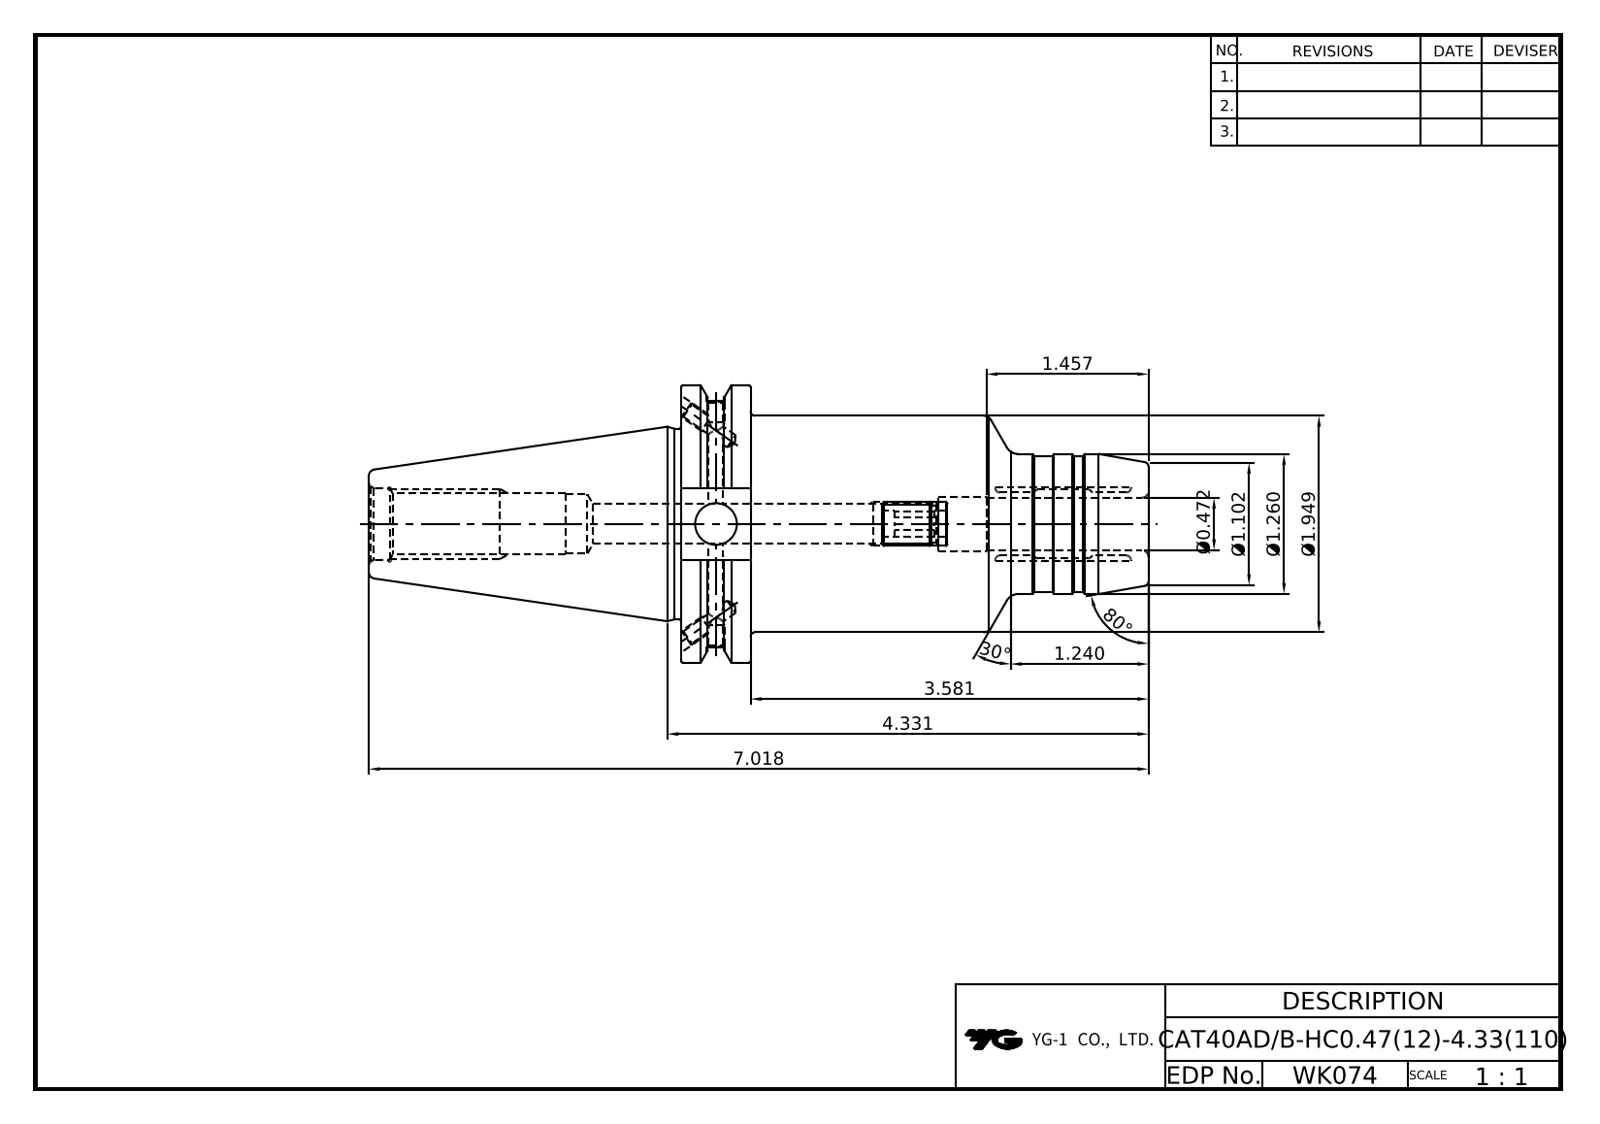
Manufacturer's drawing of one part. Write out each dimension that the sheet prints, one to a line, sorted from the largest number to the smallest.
80°
30°
7.018
4.331
3.581
Ø1.949
1.457
Ø1.260
1.240
Ø1.102
Ø0.472
